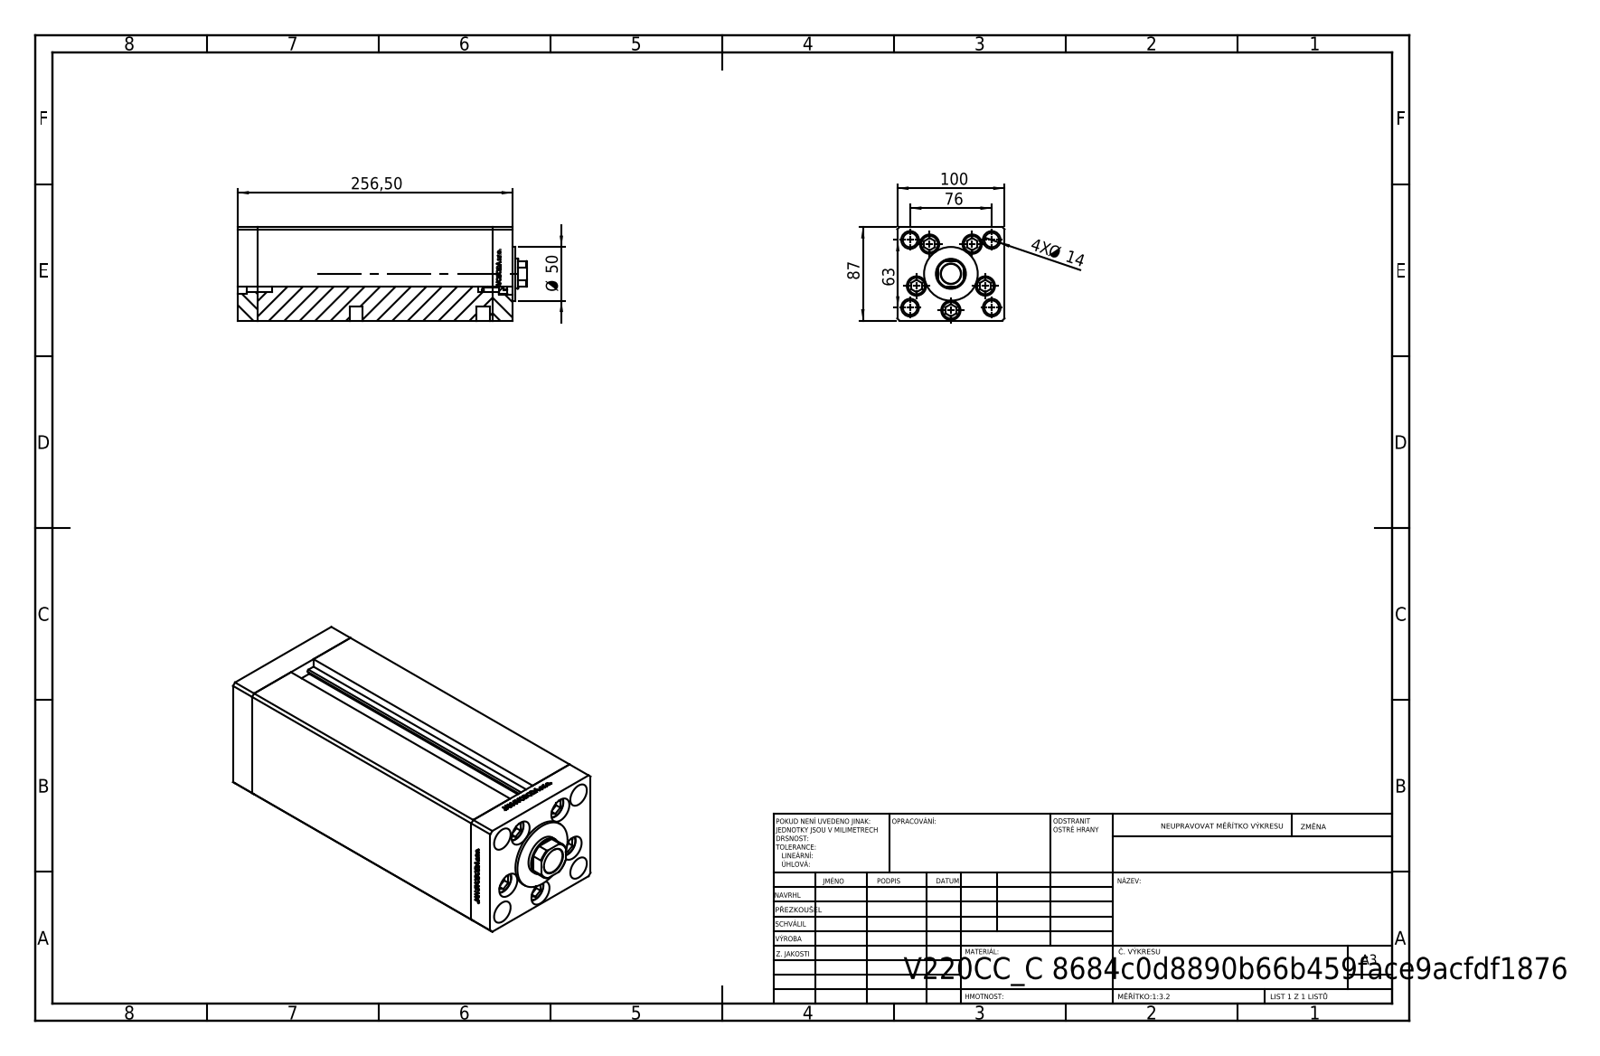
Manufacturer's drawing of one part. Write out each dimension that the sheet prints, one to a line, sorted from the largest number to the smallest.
256,50
100
87
76
63
Ø 50
4X Ø 14
